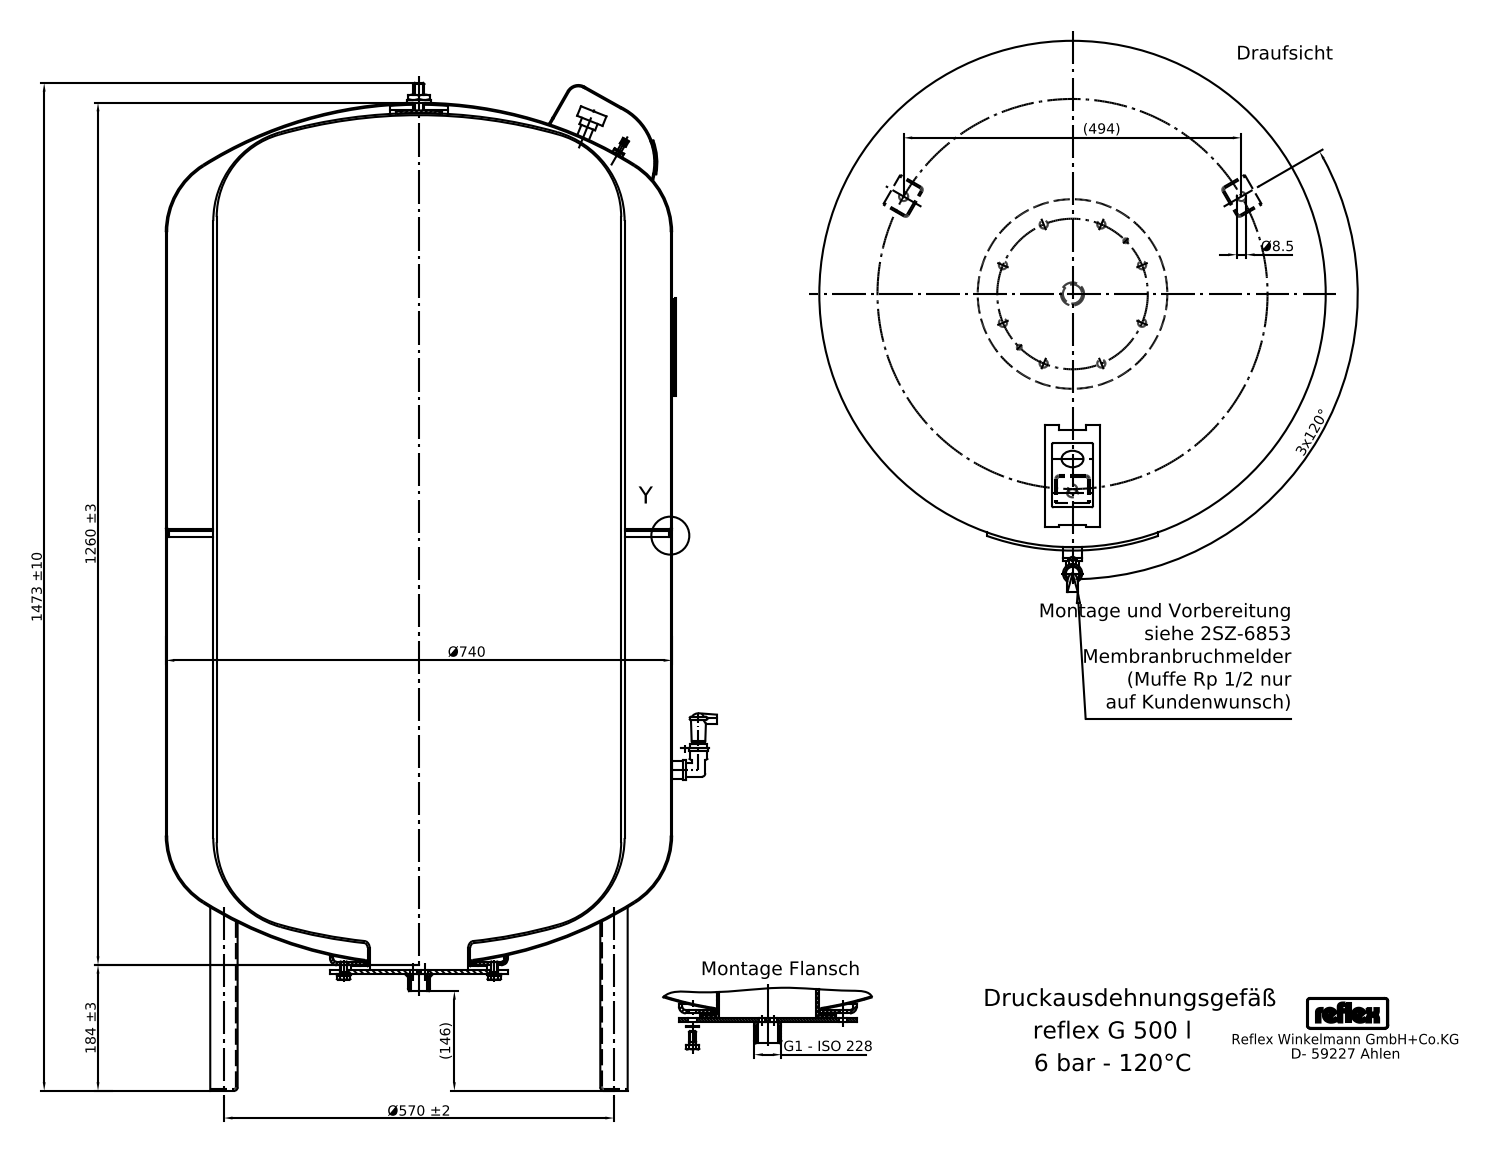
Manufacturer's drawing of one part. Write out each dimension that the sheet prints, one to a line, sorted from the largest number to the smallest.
1473 ±10
1260 ±3
Ø740
Ø570 ±2
(494)
184 ±3
(146)
3x120°
Ø8.5
G1 - ISO 228
